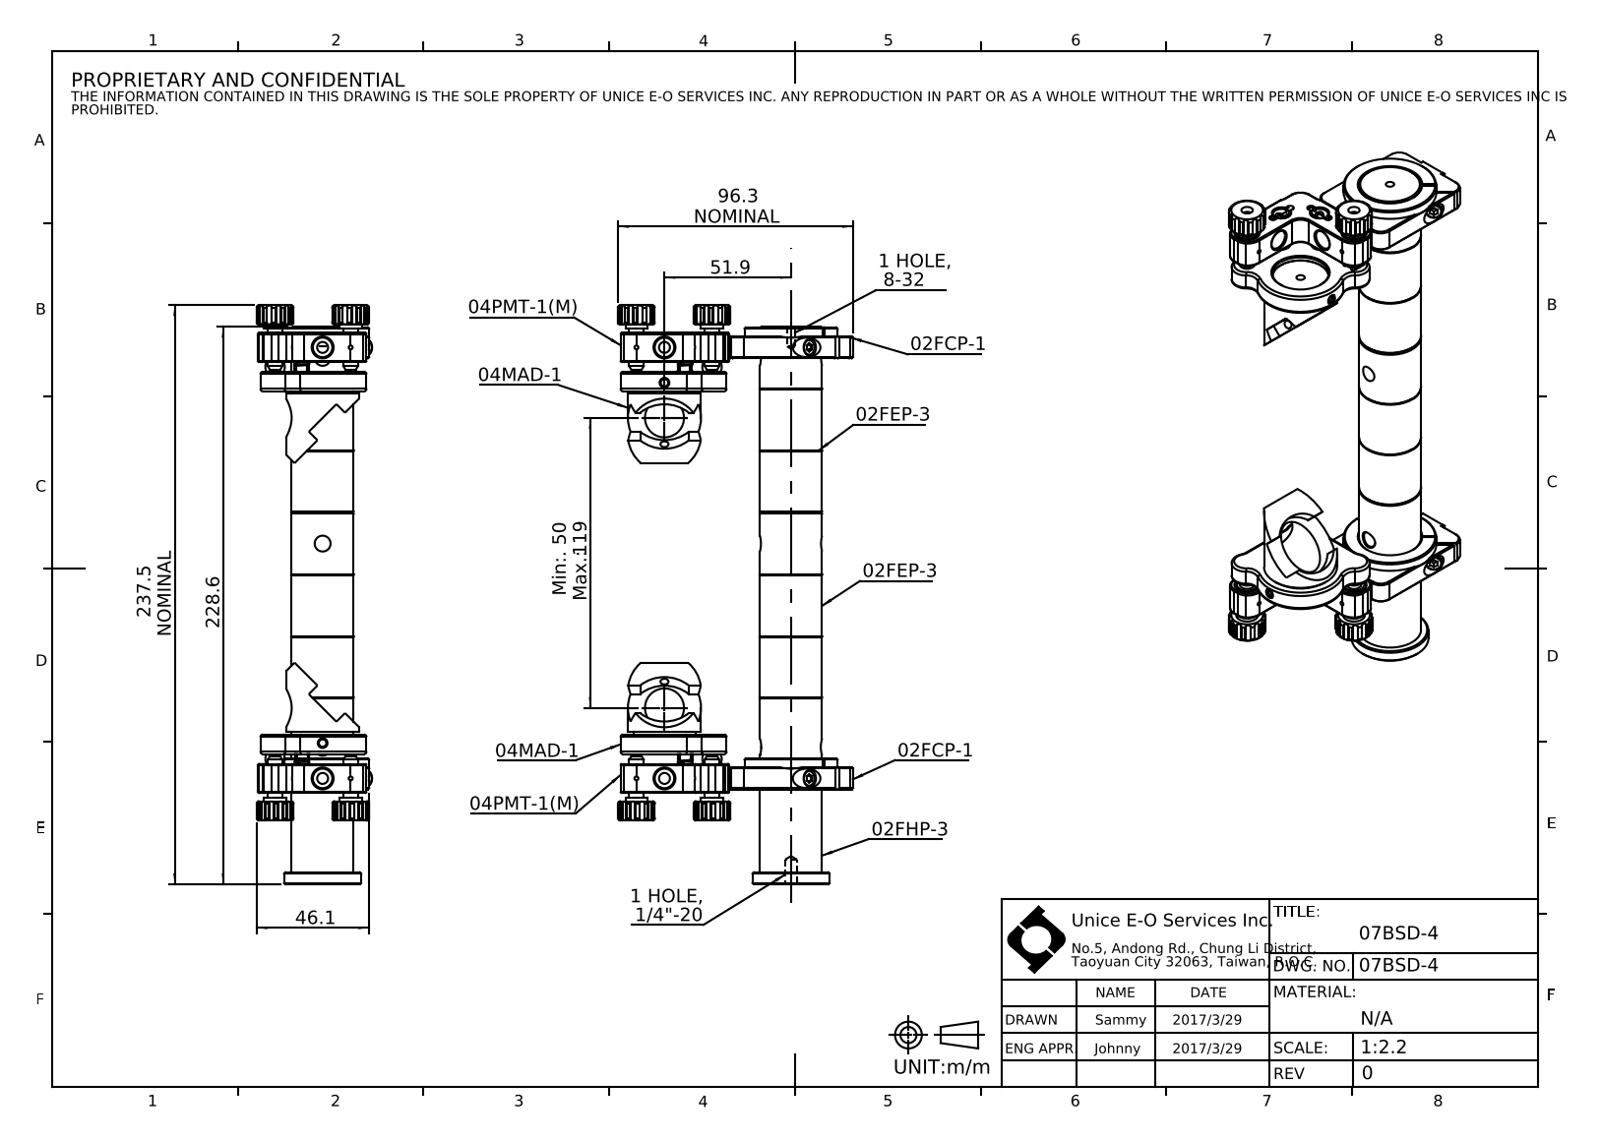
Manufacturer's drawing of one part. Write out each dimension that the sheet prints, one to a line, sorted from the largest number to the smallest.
237.5 NOMINAL
228.6
96.3 NOMINAL
51.9
Min:. 50 Max.: 119
46.1
